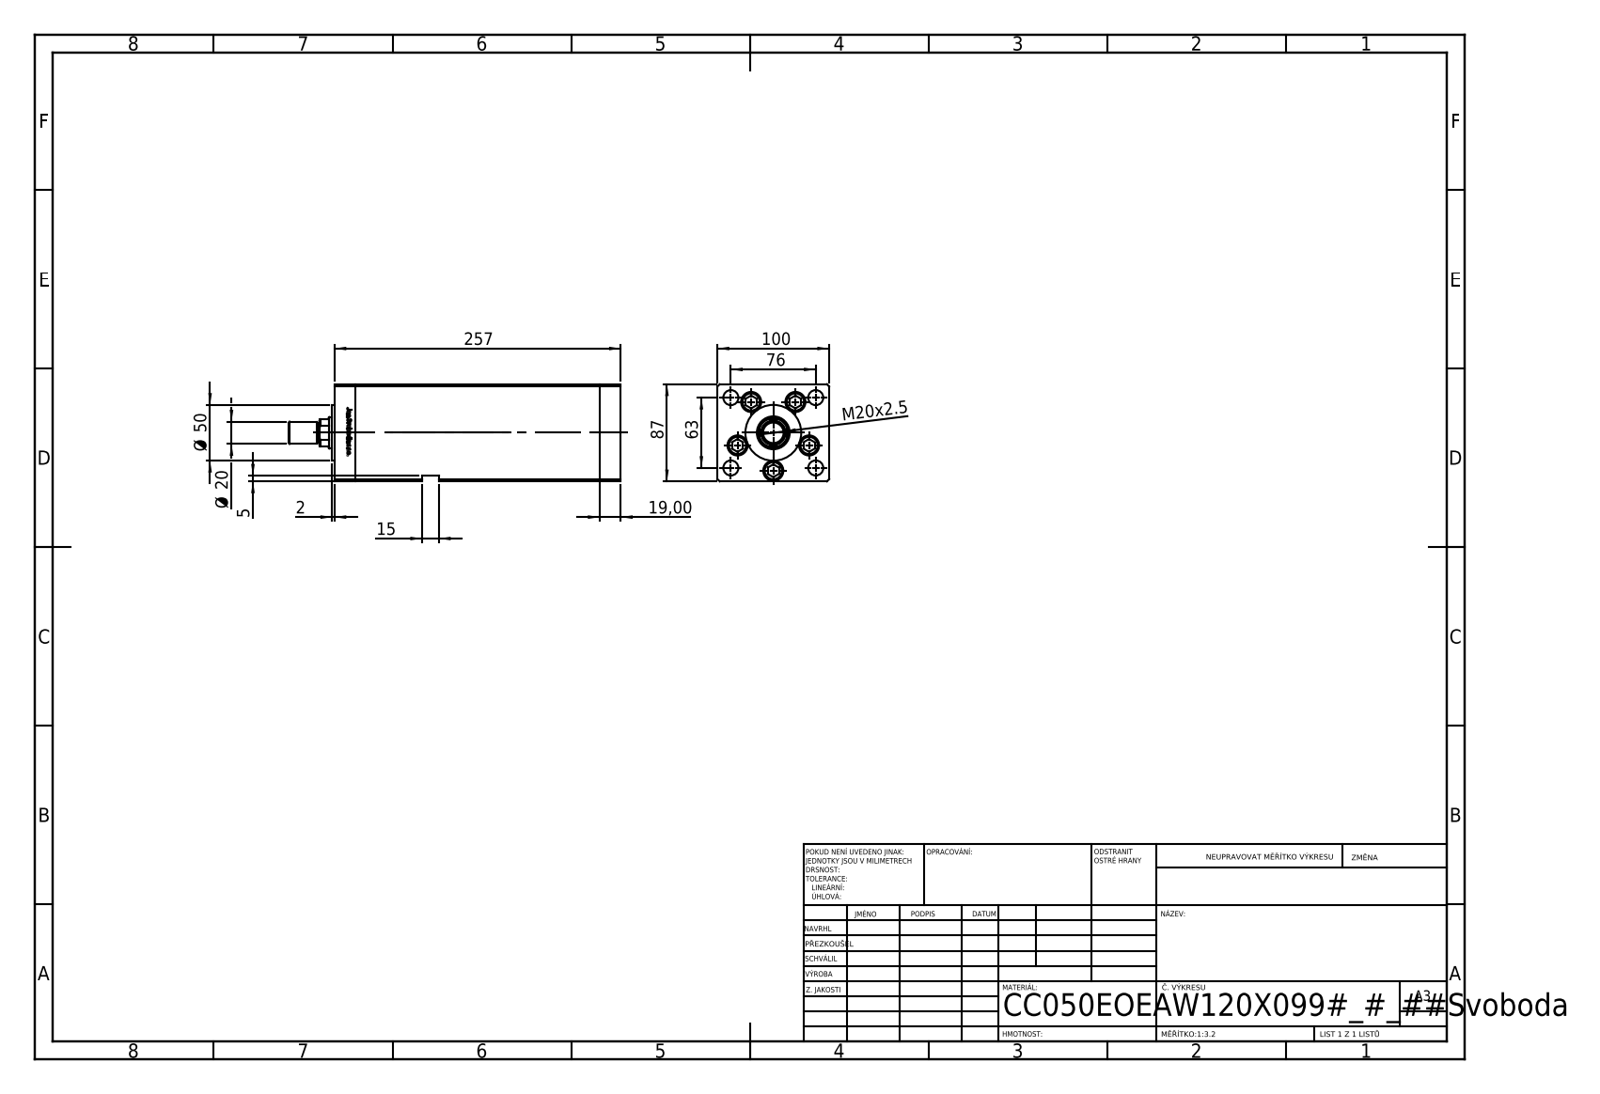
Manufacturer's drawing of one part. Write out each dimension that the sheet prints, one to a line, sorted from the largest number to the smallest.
257
100
87
76
63
Ø 50
Ø 20
M20x2.5
19,00
15
5
2
